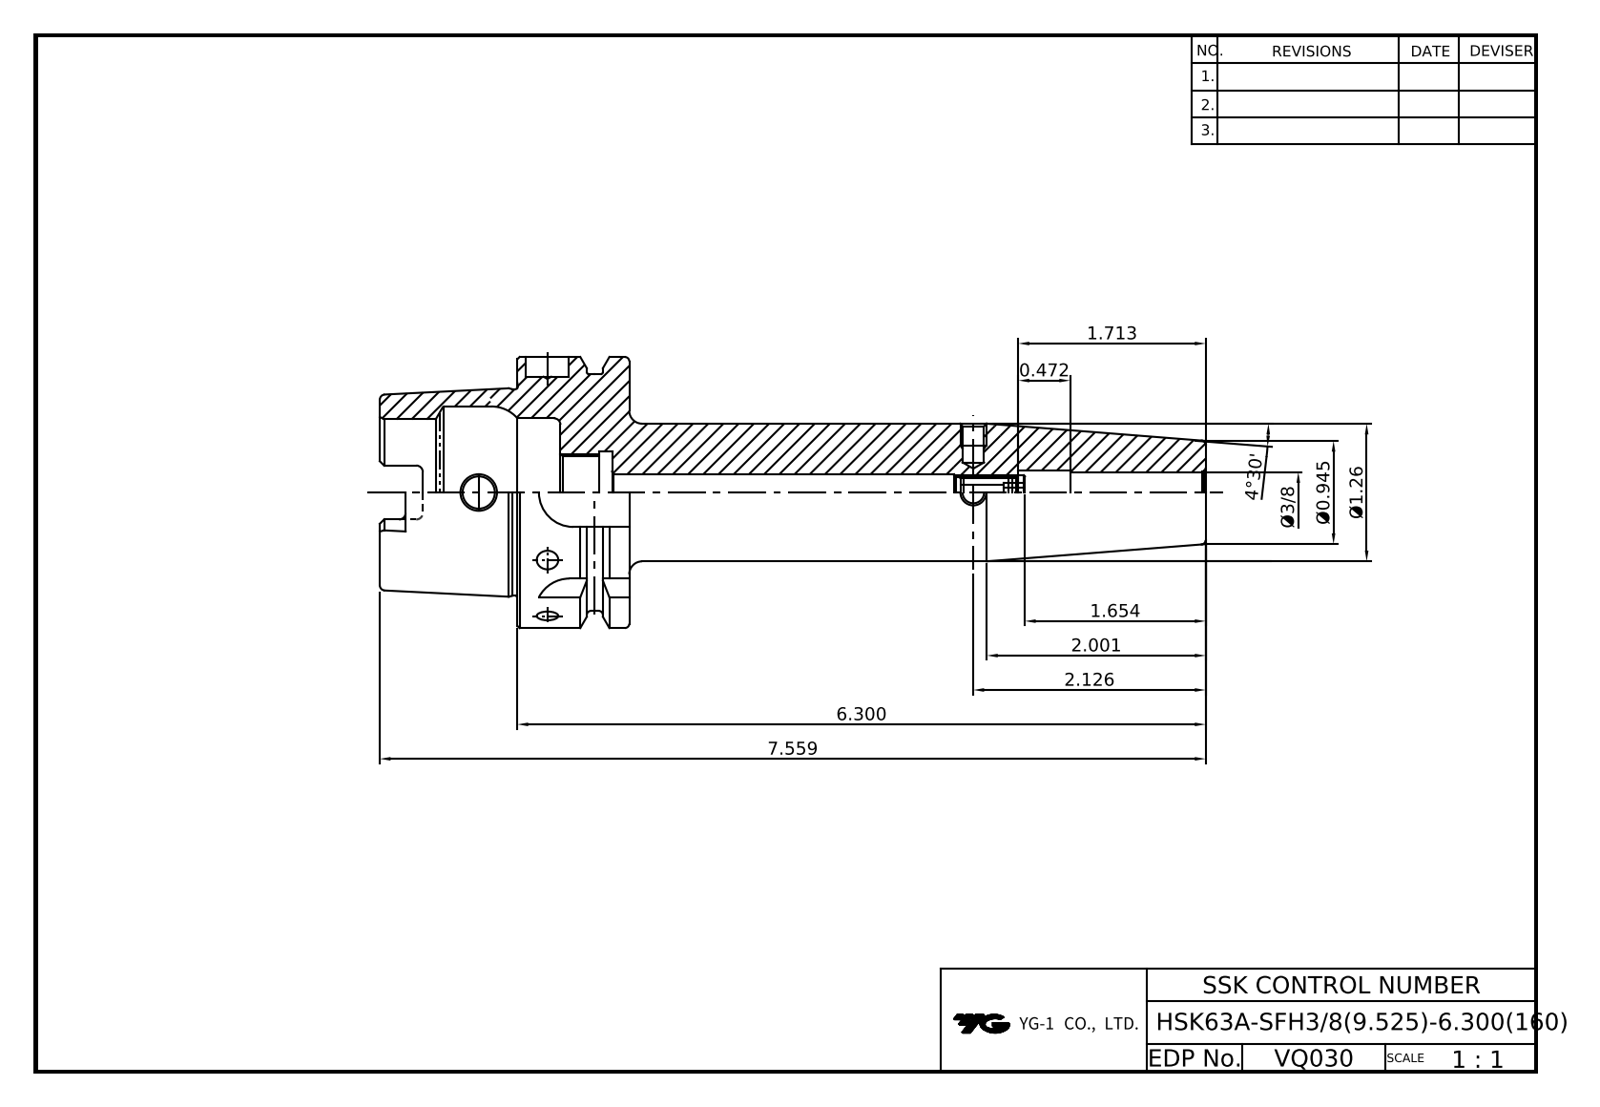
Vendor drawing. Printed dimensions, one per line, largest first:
7.559
6.300
4°30'
2.126
2.001
1.713
1.654
Ø1.26
Ø0.945
0.472
